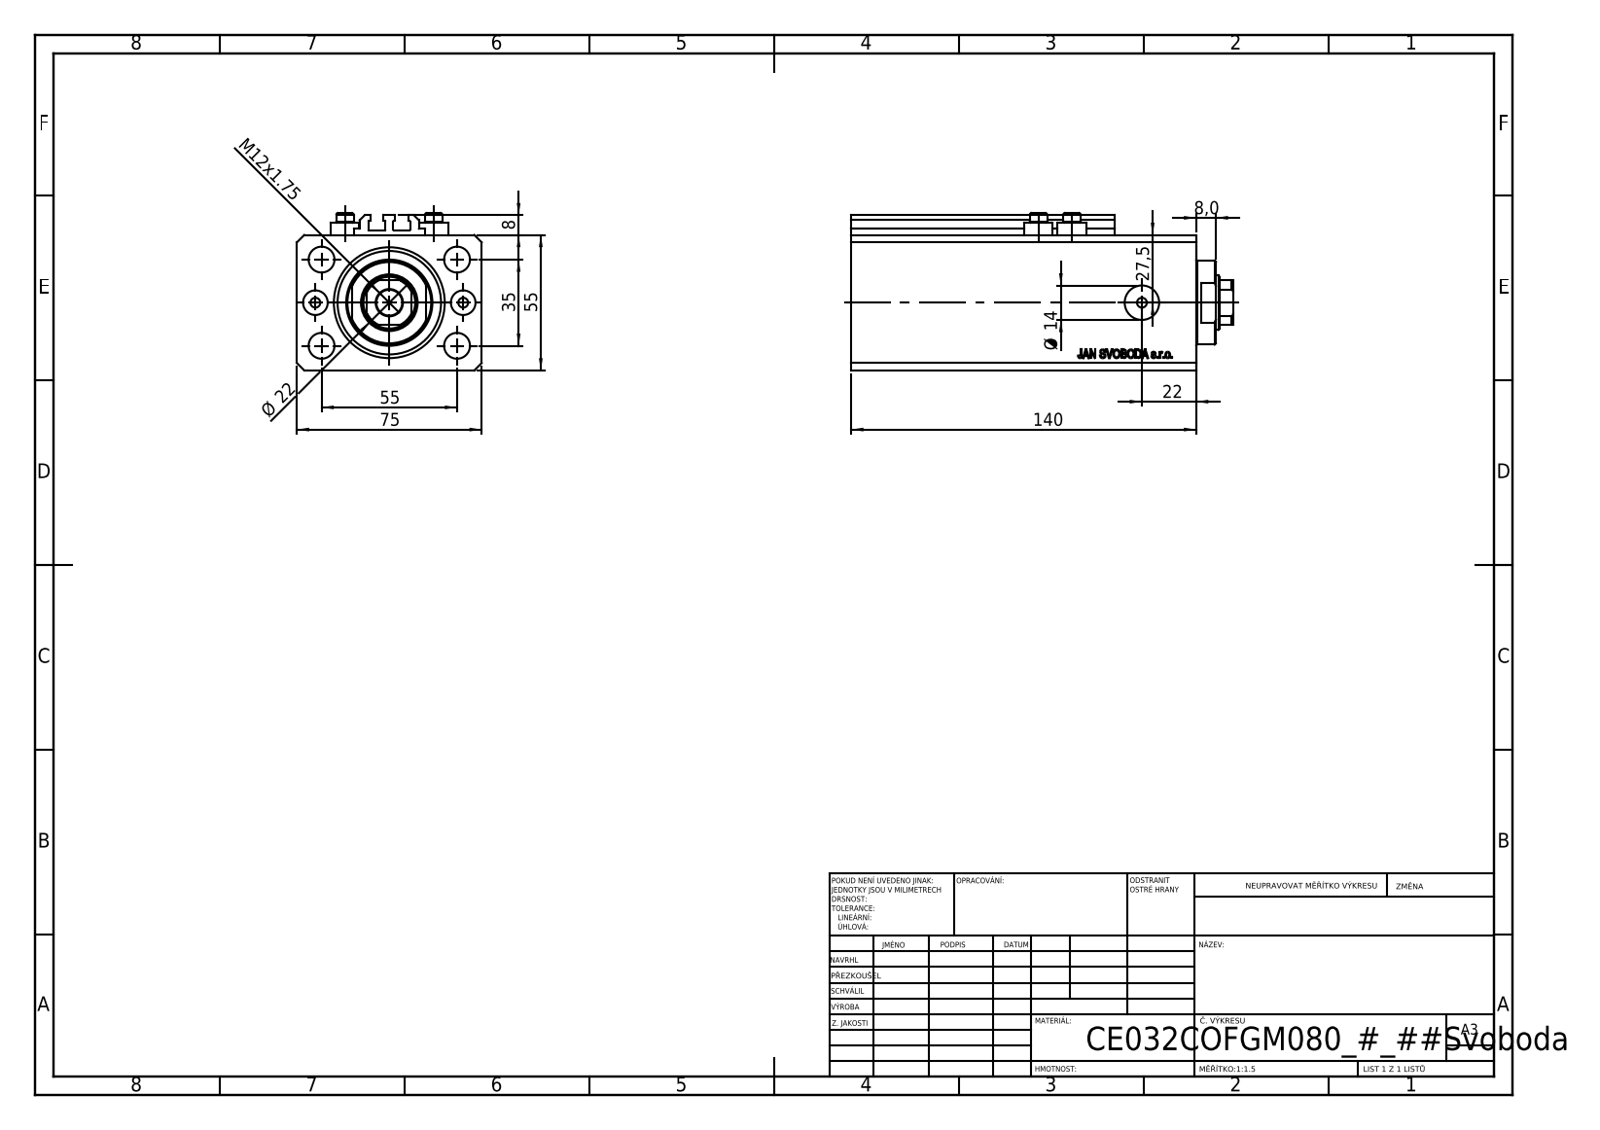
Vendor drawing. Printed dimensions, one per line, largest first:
140
75
55
55
35
27,5
Ø 22
22
Ø 14
M12x1.75
8
8,0
